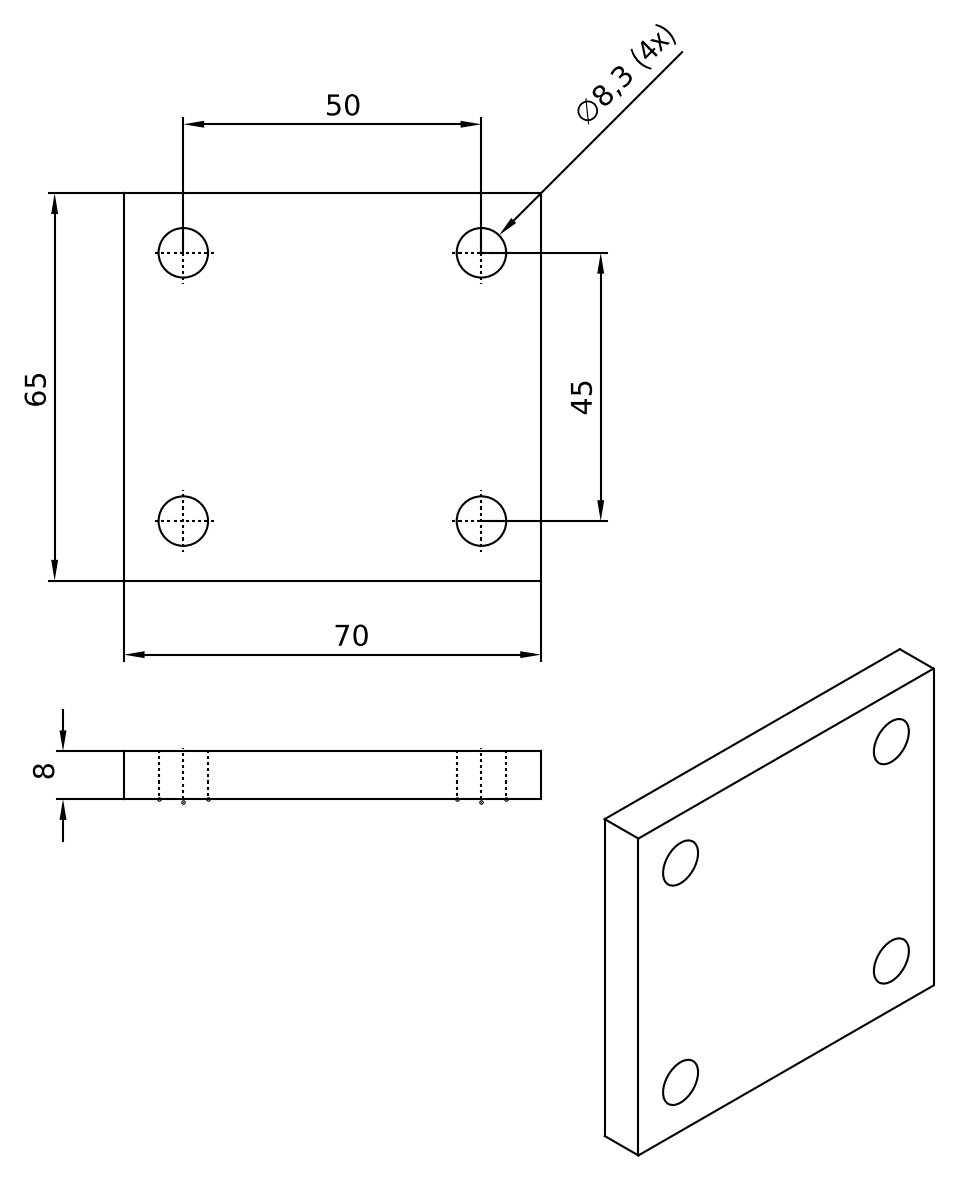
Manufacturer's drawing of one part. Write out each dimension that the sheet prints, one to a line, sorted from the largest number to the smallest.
70
65
50
45
8
(4x)
